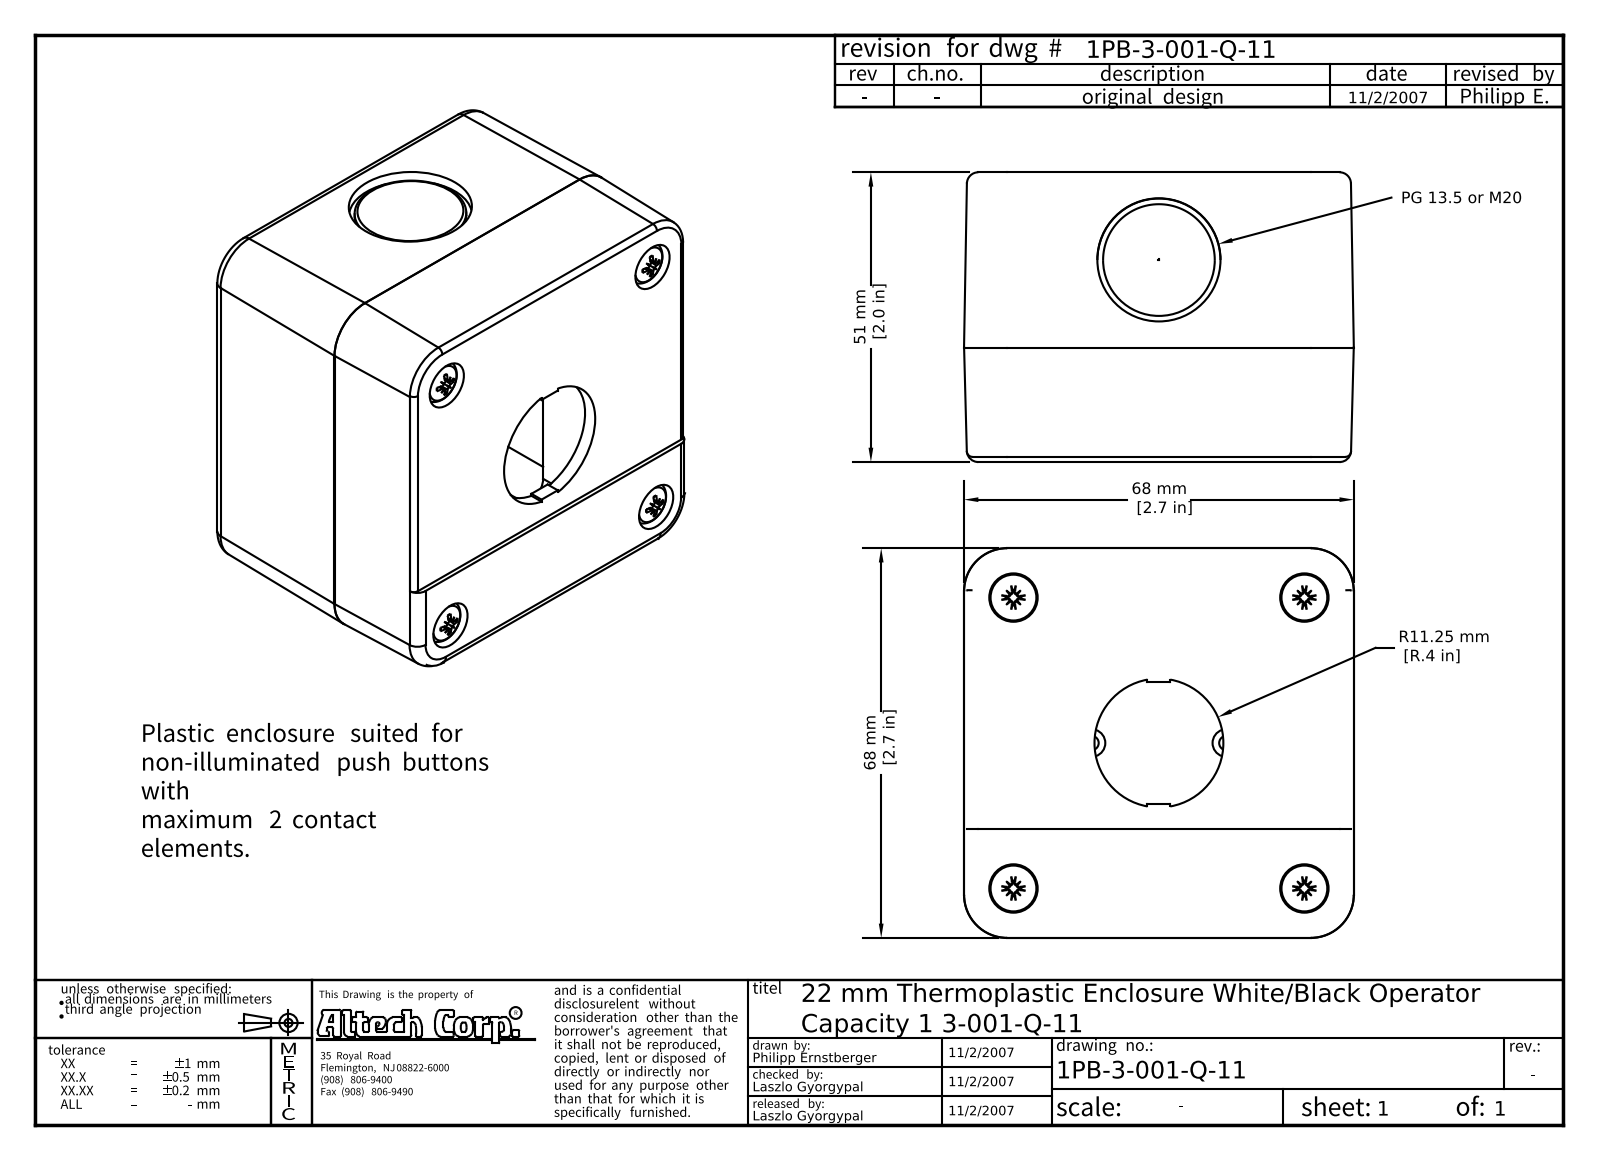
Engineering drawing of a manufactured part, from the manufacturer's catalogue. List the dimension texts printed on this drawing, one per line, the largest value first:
68 mm [2.7 in]
68 mm [2.7 in]
51 mm [2.0 in]
PG 13.5 or M20
R11.25 mm [R.4 in]
